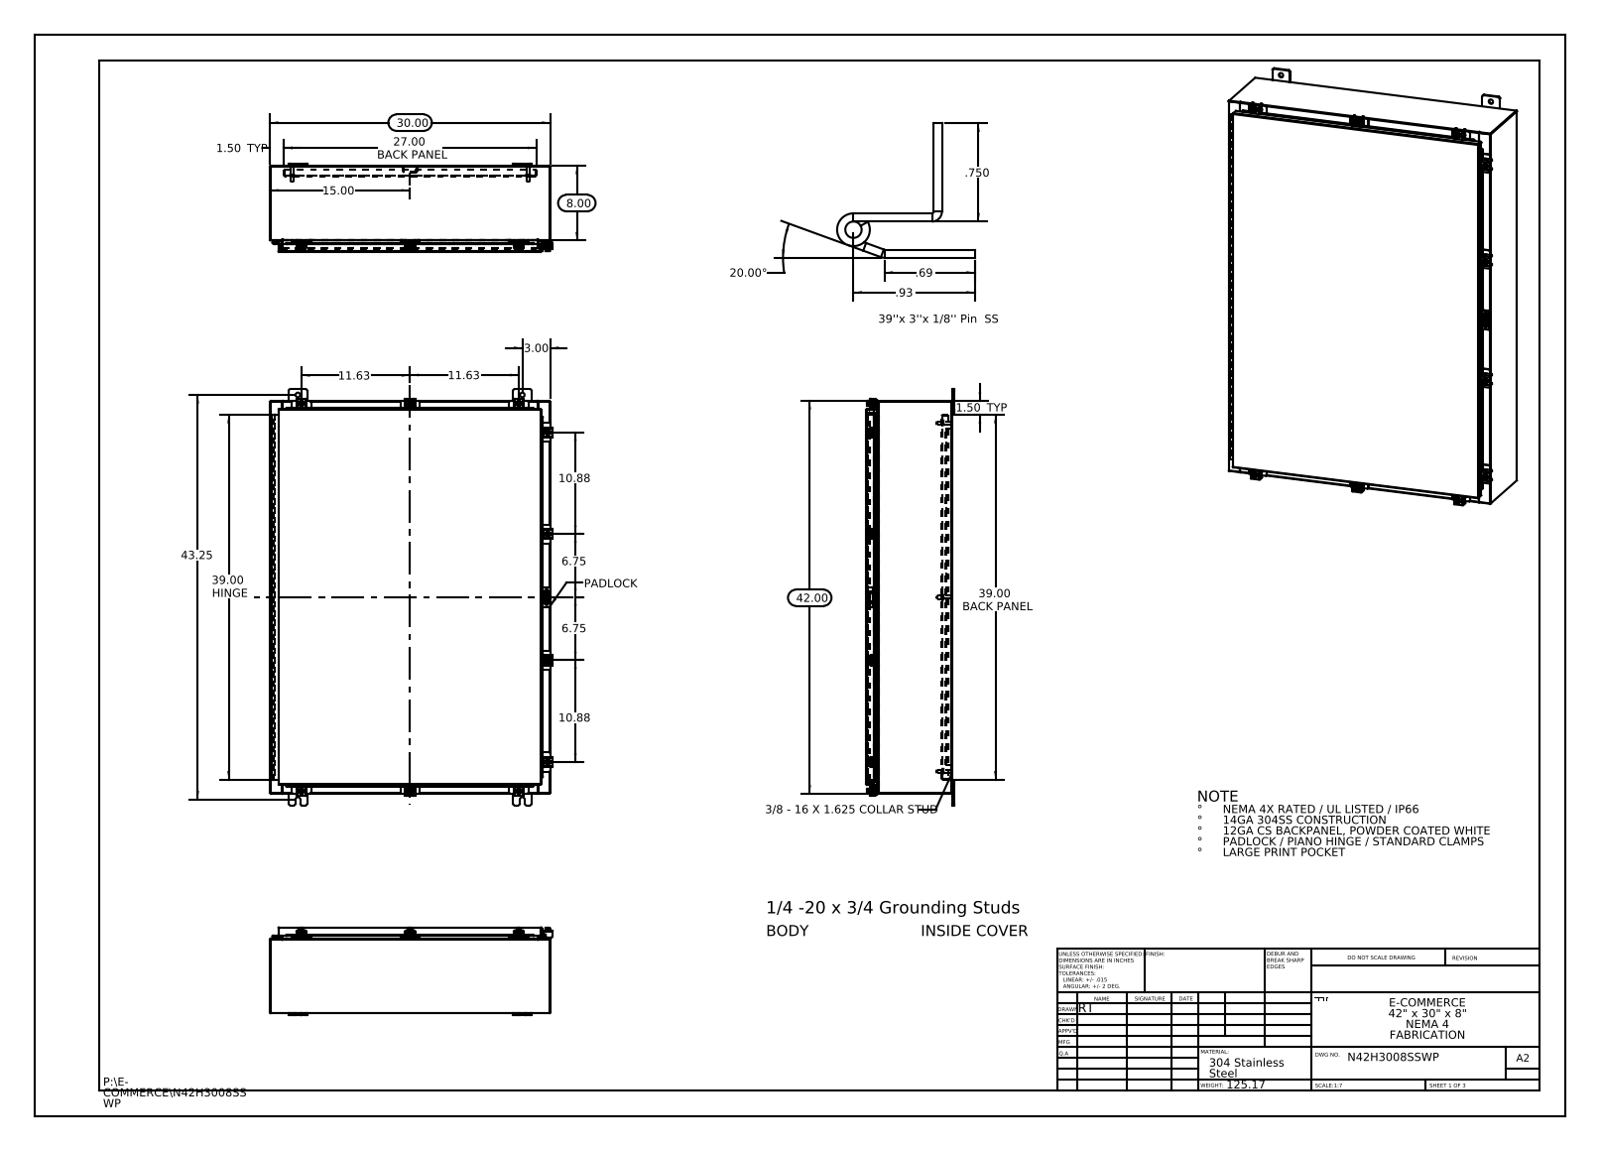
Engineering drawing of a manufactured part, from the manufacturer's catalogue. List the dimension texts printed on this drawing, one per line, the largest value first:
43.25
42.00
39.00 HINGE
39.00 BACK PANEL
30.00
27.00 BACK PANEL
20.00°
15.00
11.63
11.63
10.88
10.88
8.00
6.75
6.75
3.00
1.50 TYP
1.50 TYP
.93
.750
.69
